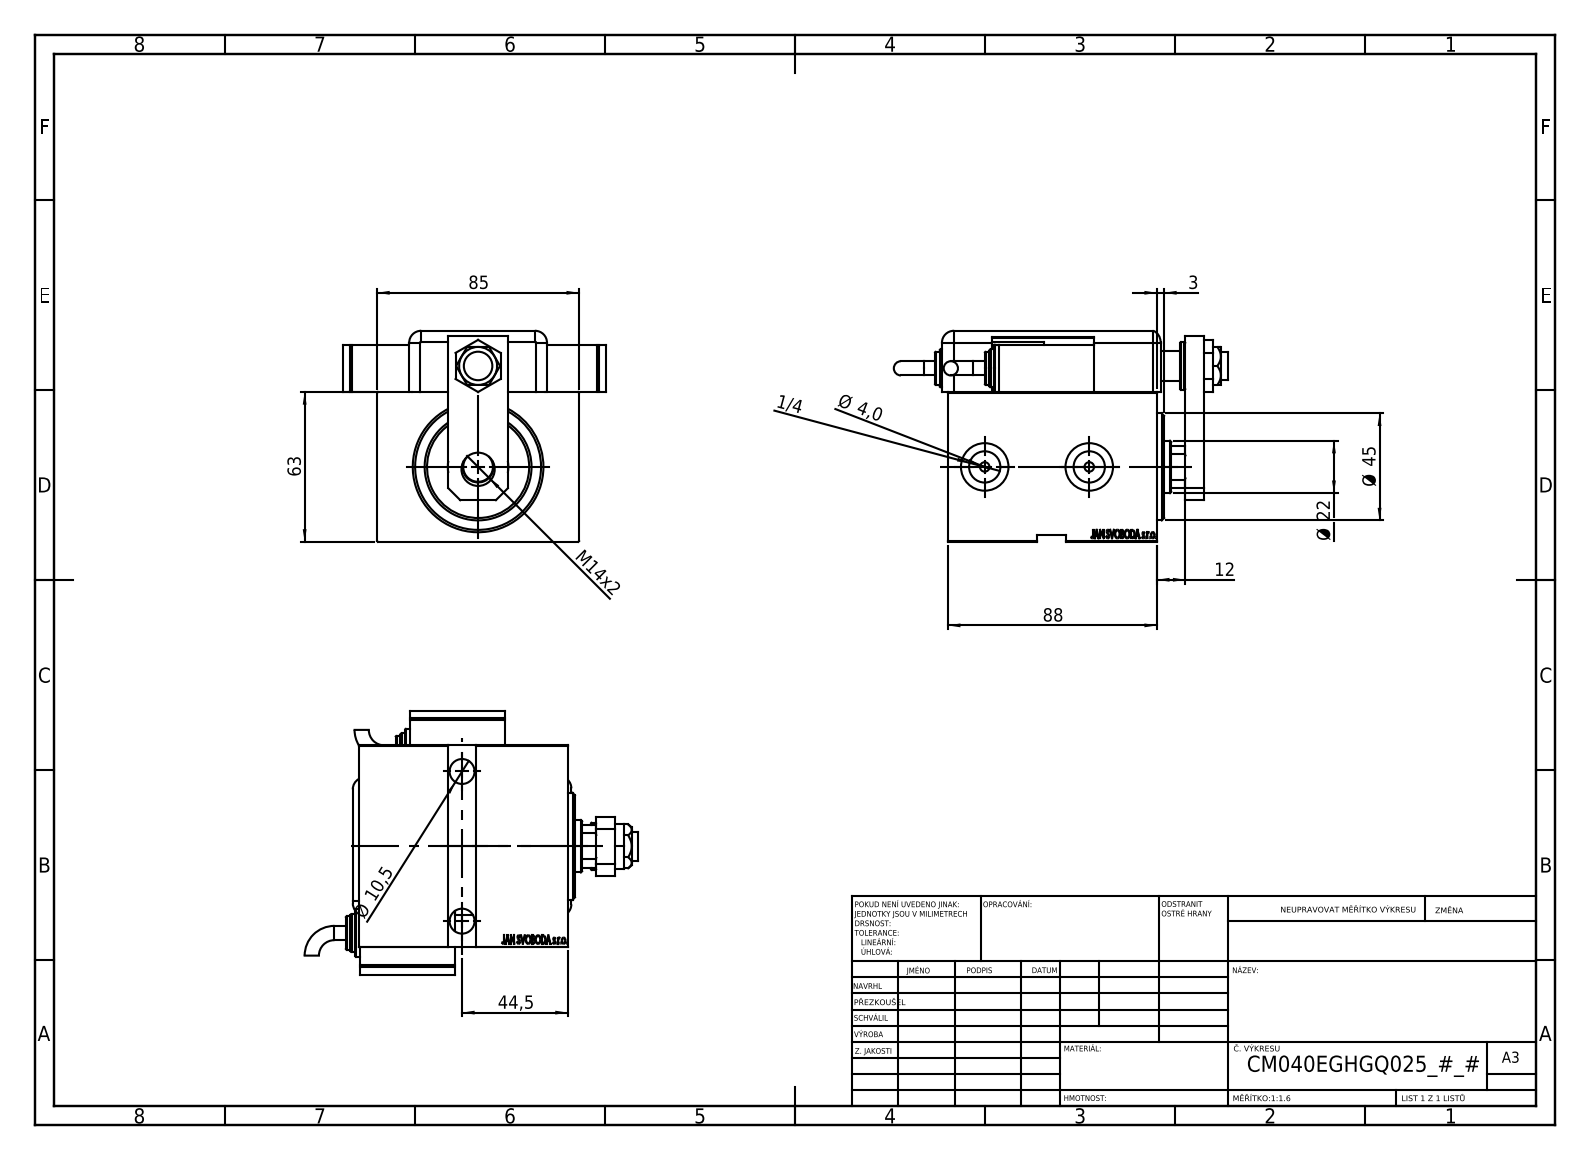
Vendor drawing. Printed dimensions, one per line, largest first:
88
85
63
Ø 45
44,5
Ø 22
M14x2
12
Ø 10,5
Ø 4,0
3
1/4
